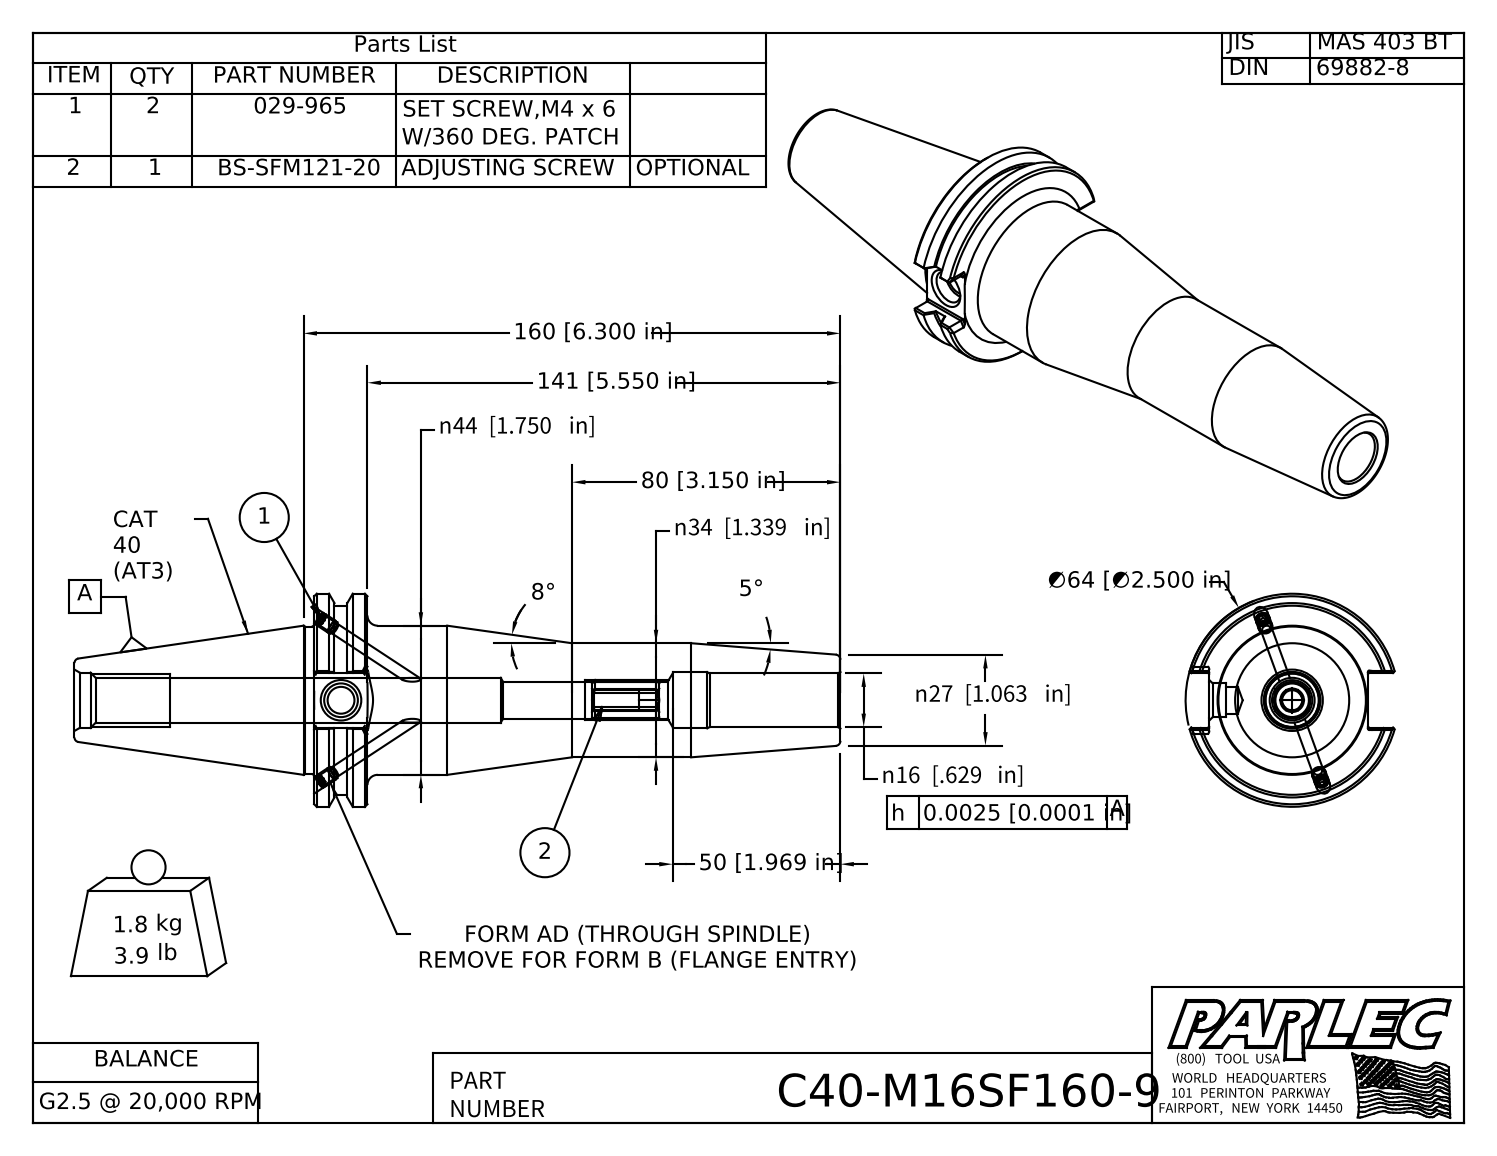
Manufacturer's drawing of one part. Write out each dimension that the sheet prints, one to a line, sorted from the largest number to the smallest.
160 [6.300 in]
141 [5.550 in]
80 [3.150 in]
∅64 [∅2.500 in]
50 [1.969 in]
n44 [1.750 in]
n34 [1.339 in]
n27 [1.063 in]
n16 [.629 in]
8°
5°
